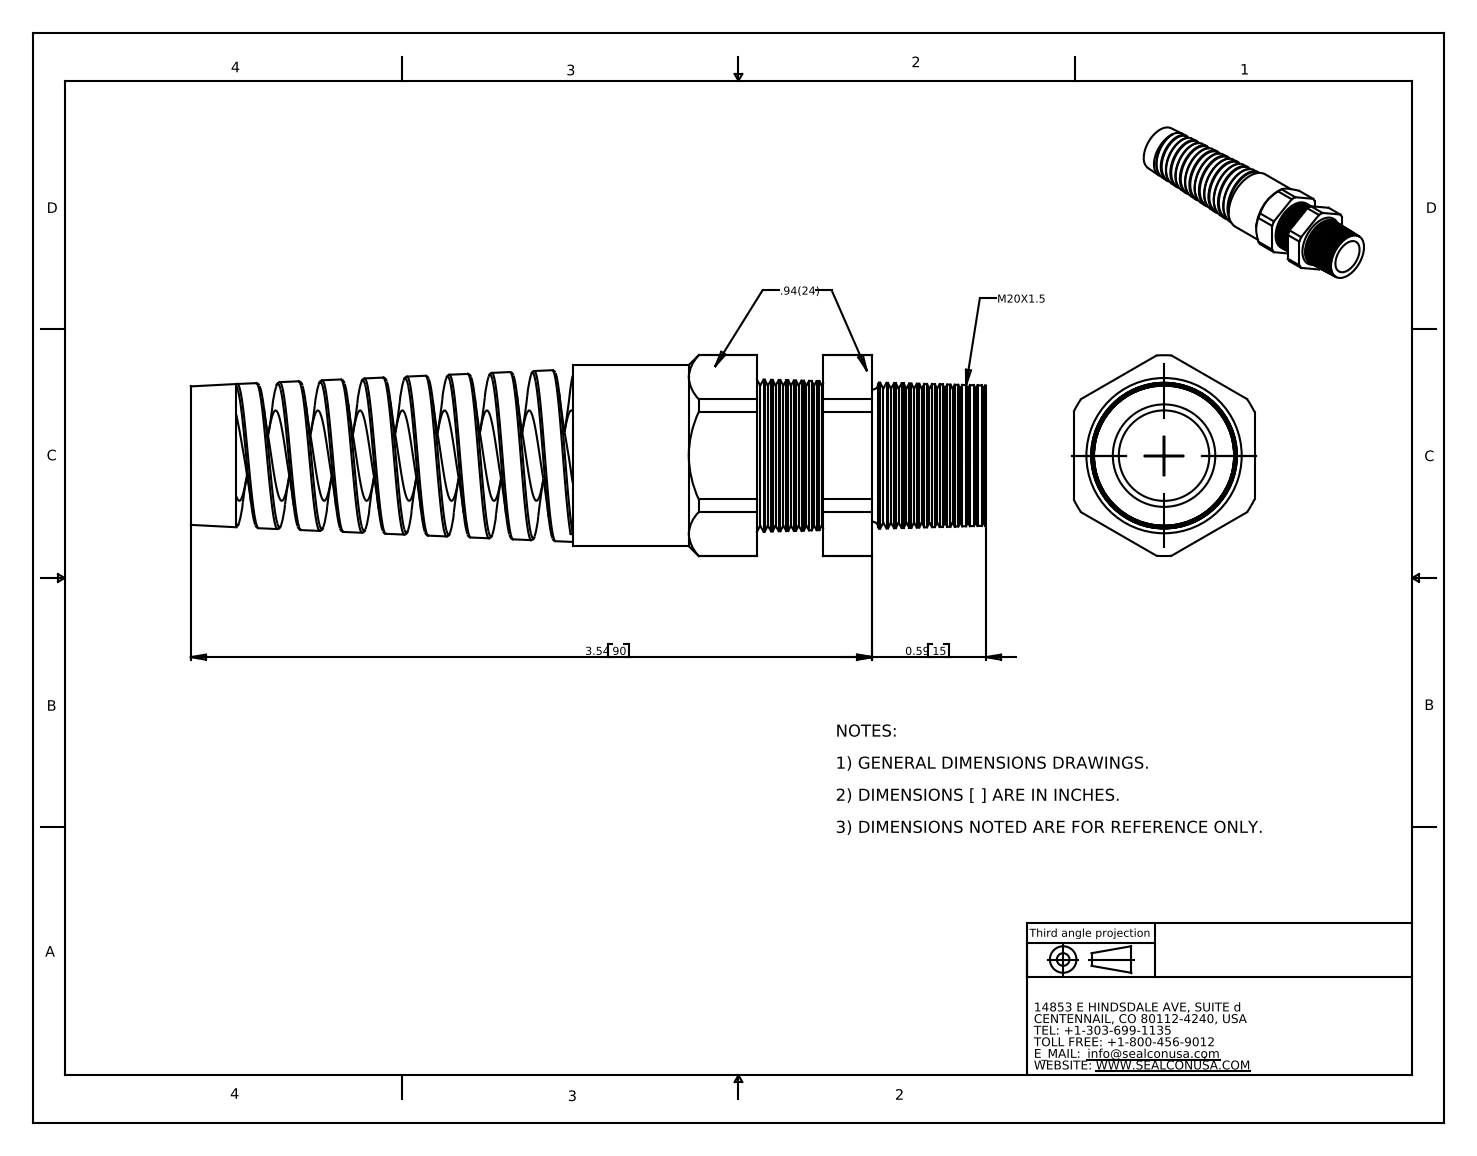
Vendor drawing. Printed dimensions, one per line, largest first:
3.54 90
0.59 15
